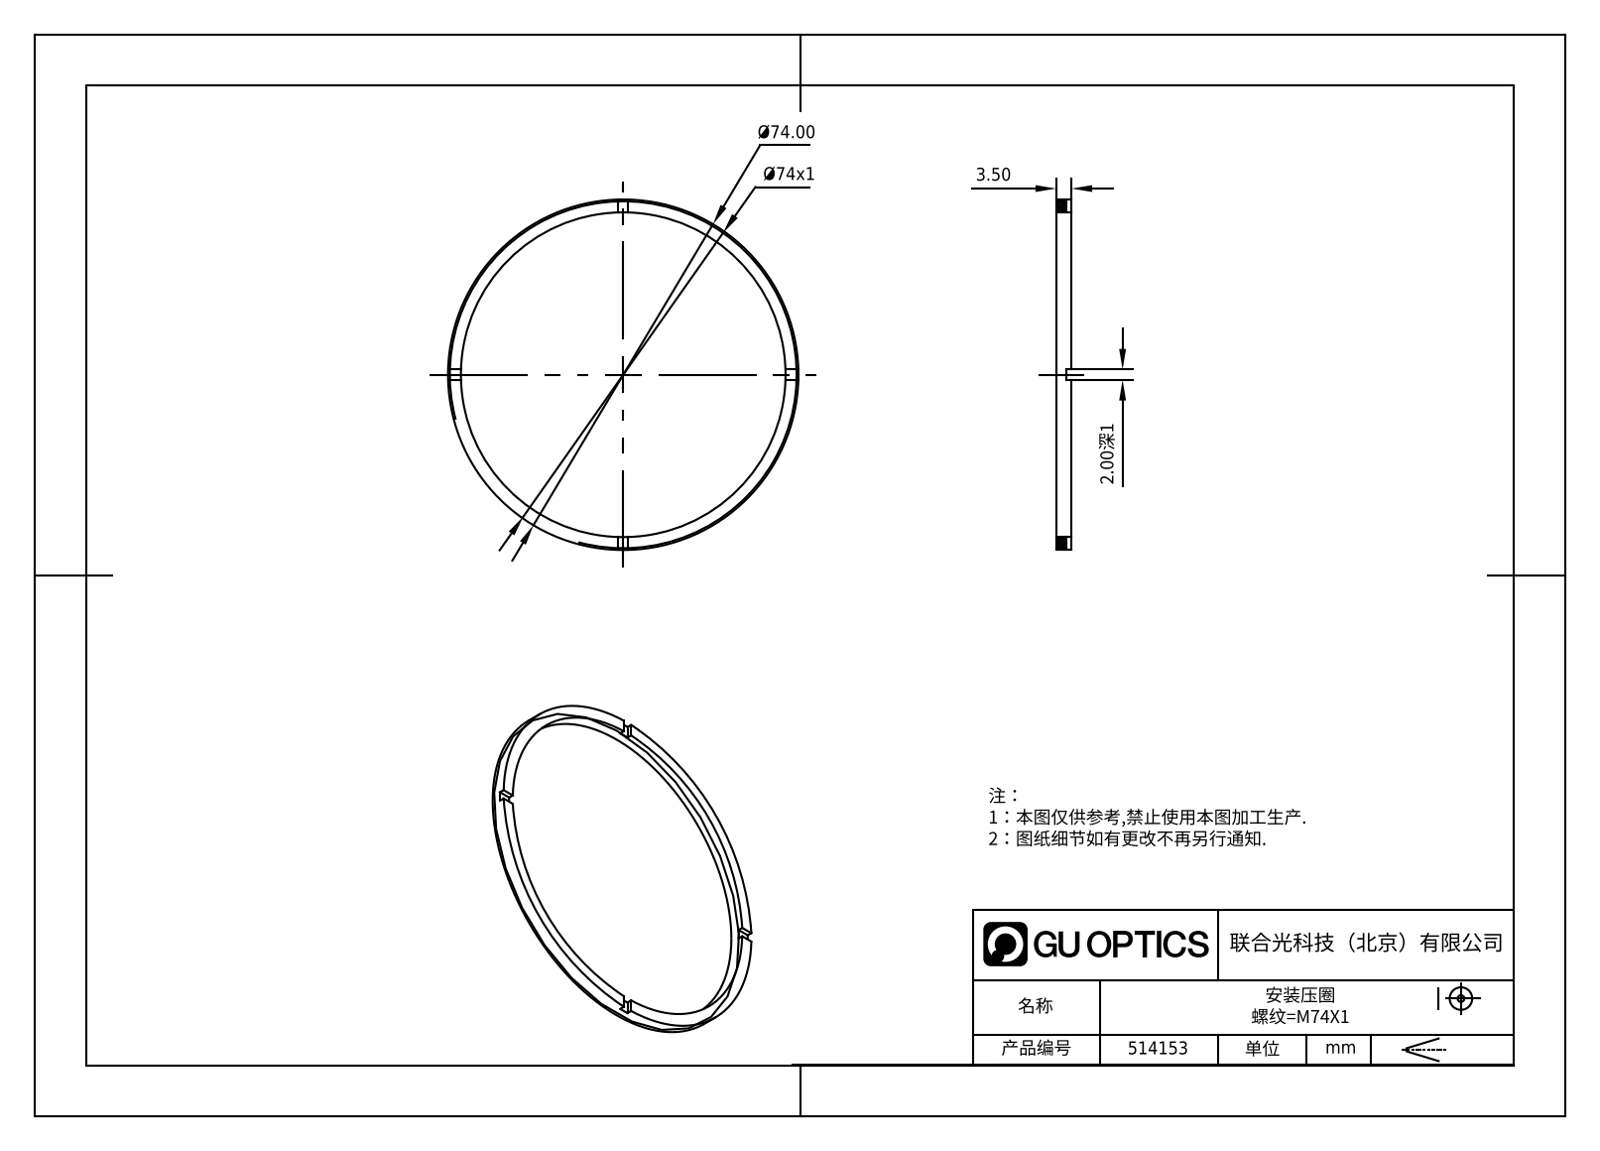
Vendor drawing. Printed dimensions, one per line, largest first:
Ø74.00
Ø74x1
3.50
2.00深1
